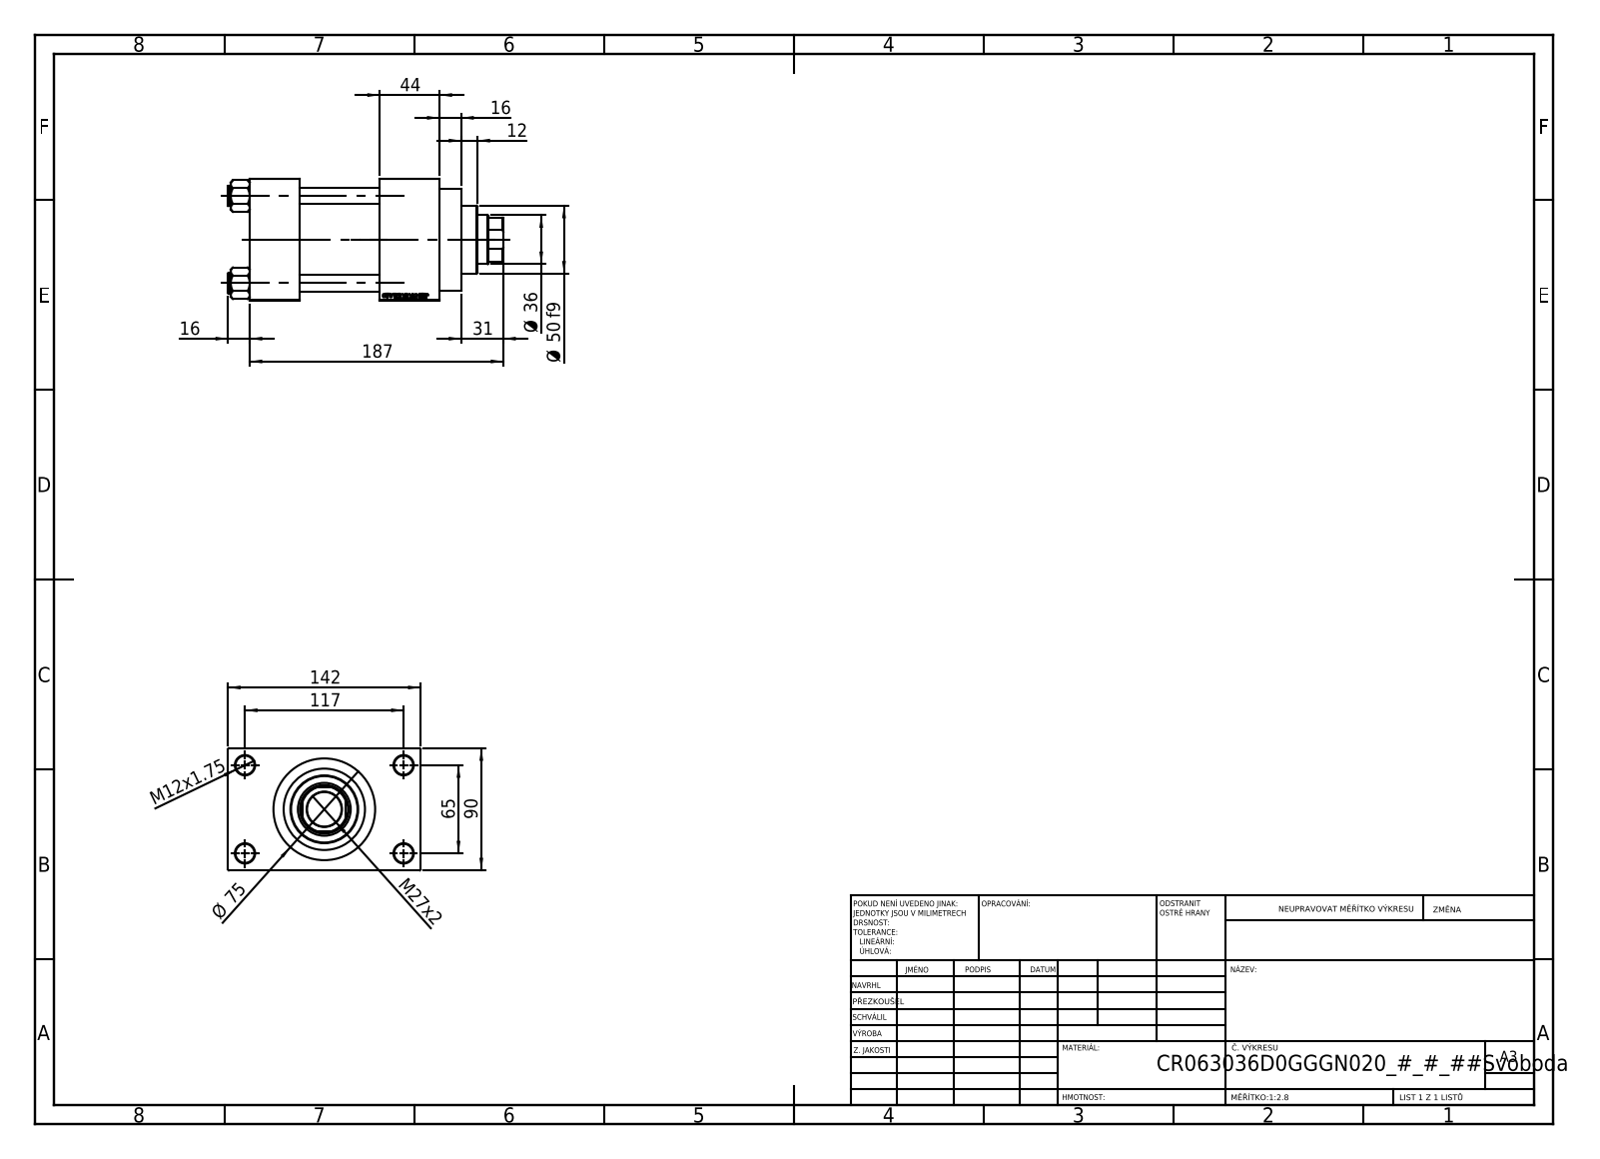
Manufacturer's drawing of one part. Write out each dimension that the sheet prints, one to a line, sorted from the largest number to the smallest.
187
142
117
90
Ø 75
65
Ø 50 f9
44
Ø 36
31
M27x2
16
16
12
M12x1.75
